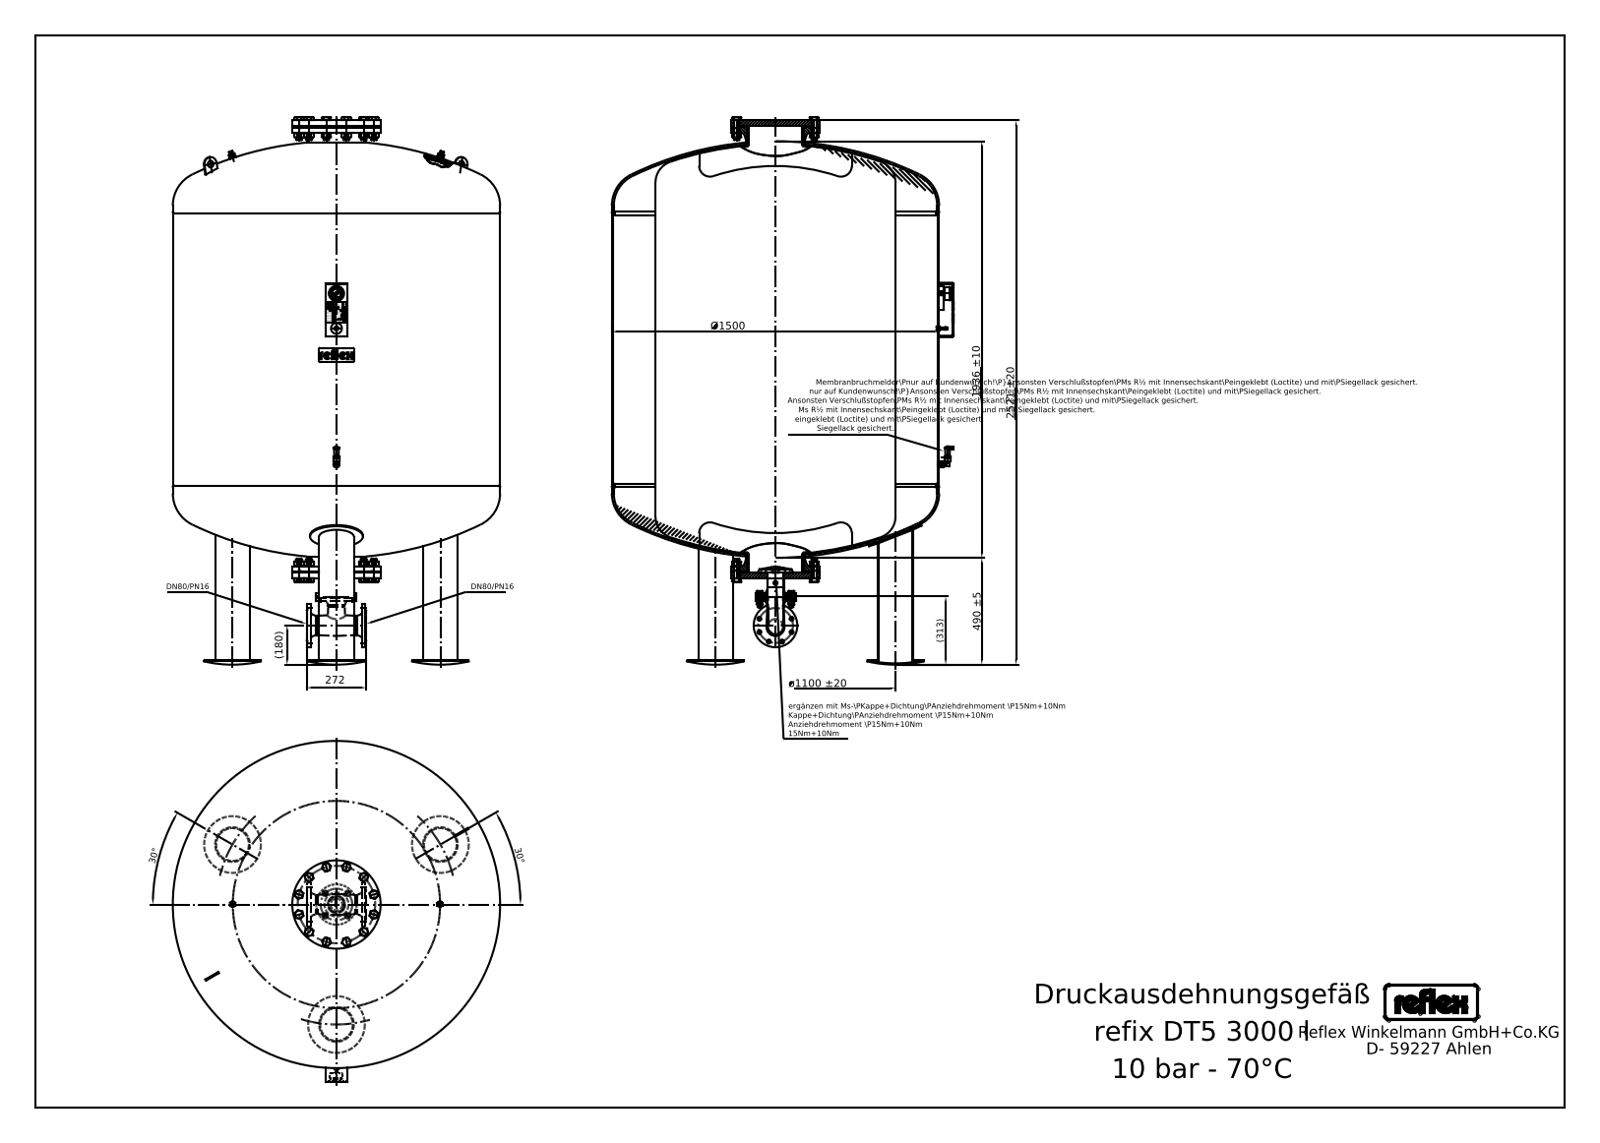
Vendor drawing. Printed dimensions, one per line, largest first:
2521 ±20
1936 ±10
Ø1500
ø1100 ±20
490 ±5
(313)
272
(180)
30°
30°
